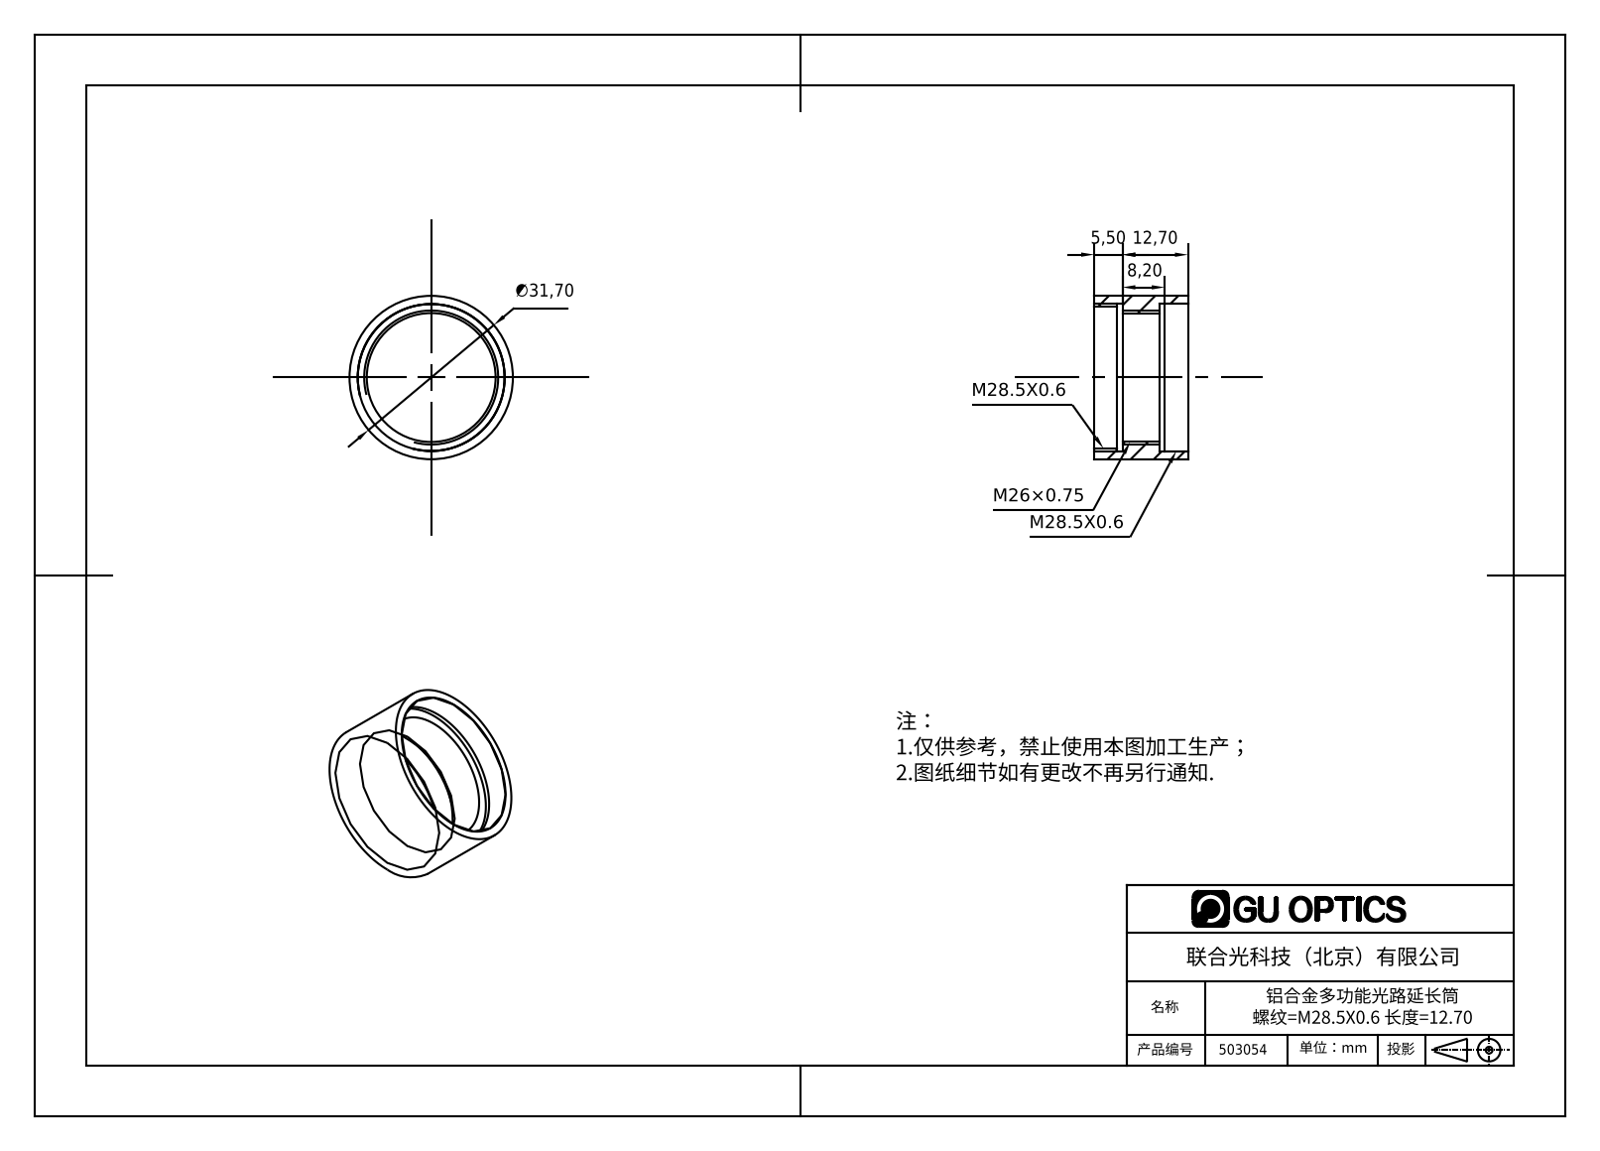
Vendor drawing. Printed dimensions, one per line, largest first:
∅31,70
12,70
8,20
5,50
